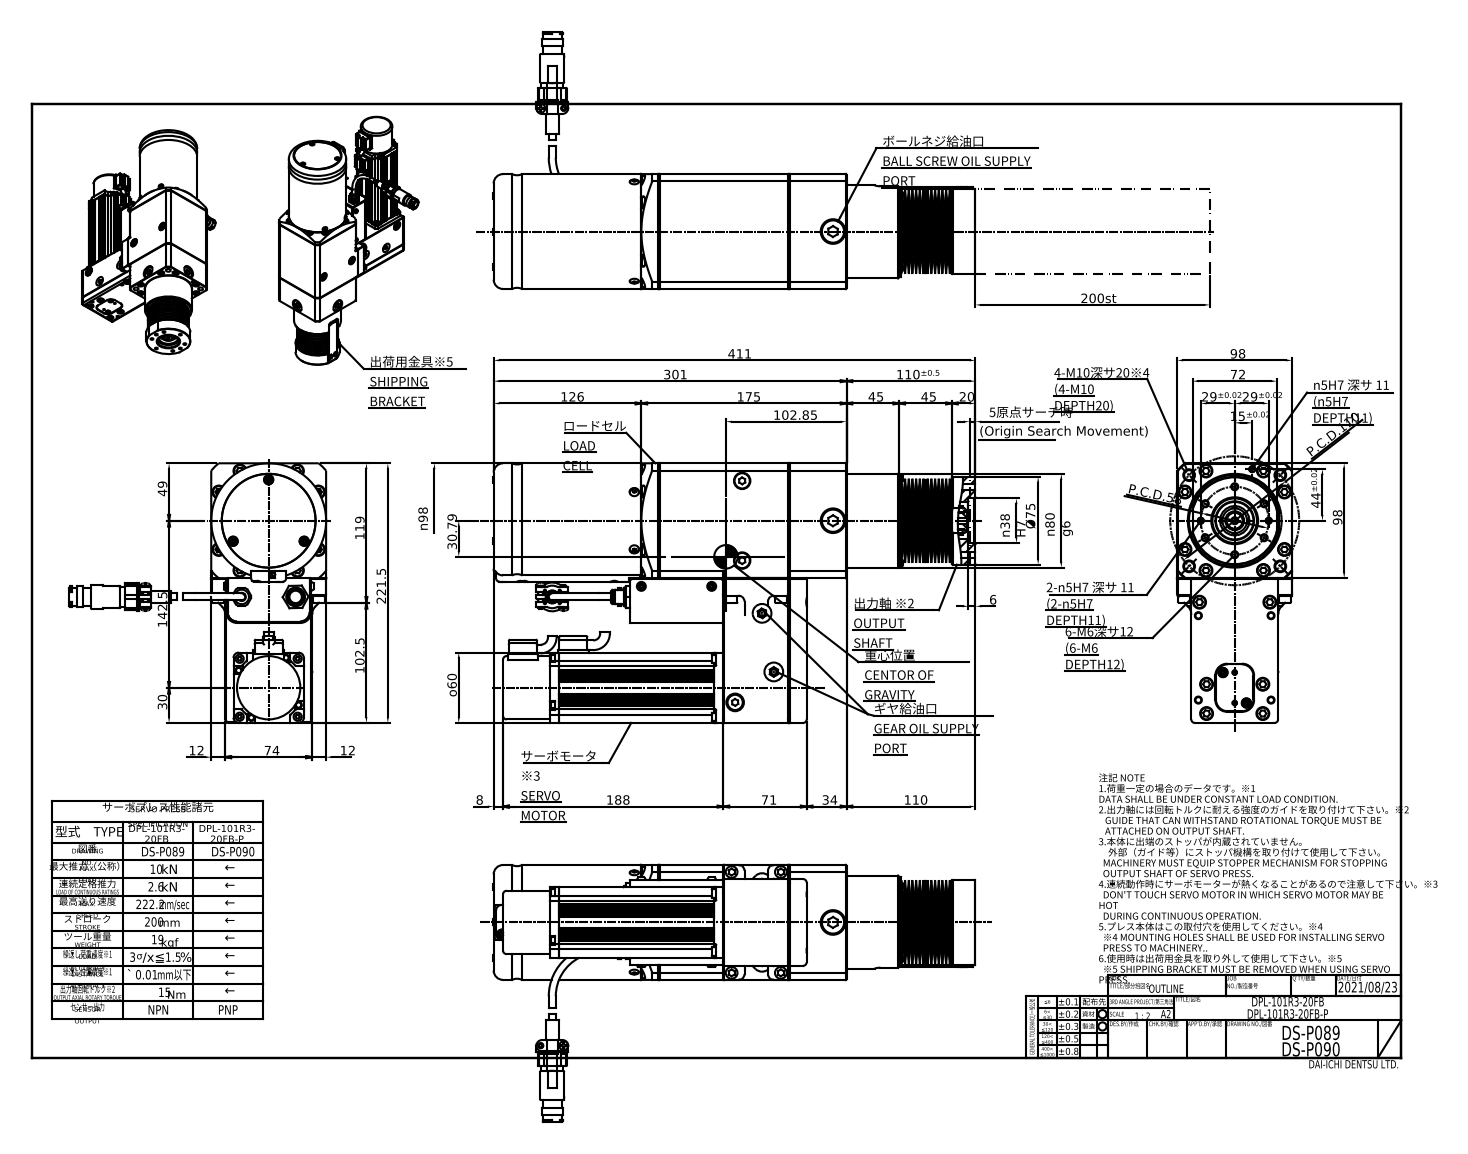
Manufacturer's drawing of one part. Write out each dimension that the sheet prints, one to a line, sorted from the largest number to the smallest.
411
301
221.5
200st
188
175
142.5
126
119
110±0.5
110
102.85
102.5
n98
98
98
n80 g6
Ø75
74
72
71
o60
49
45
45
44±0.02
n38 H7
34
30.79
30
29±0.02
29±0.02
20
15±0.02
12
12
8
6
5原点サーチ時
P.C.D.58
P.C.D.110
